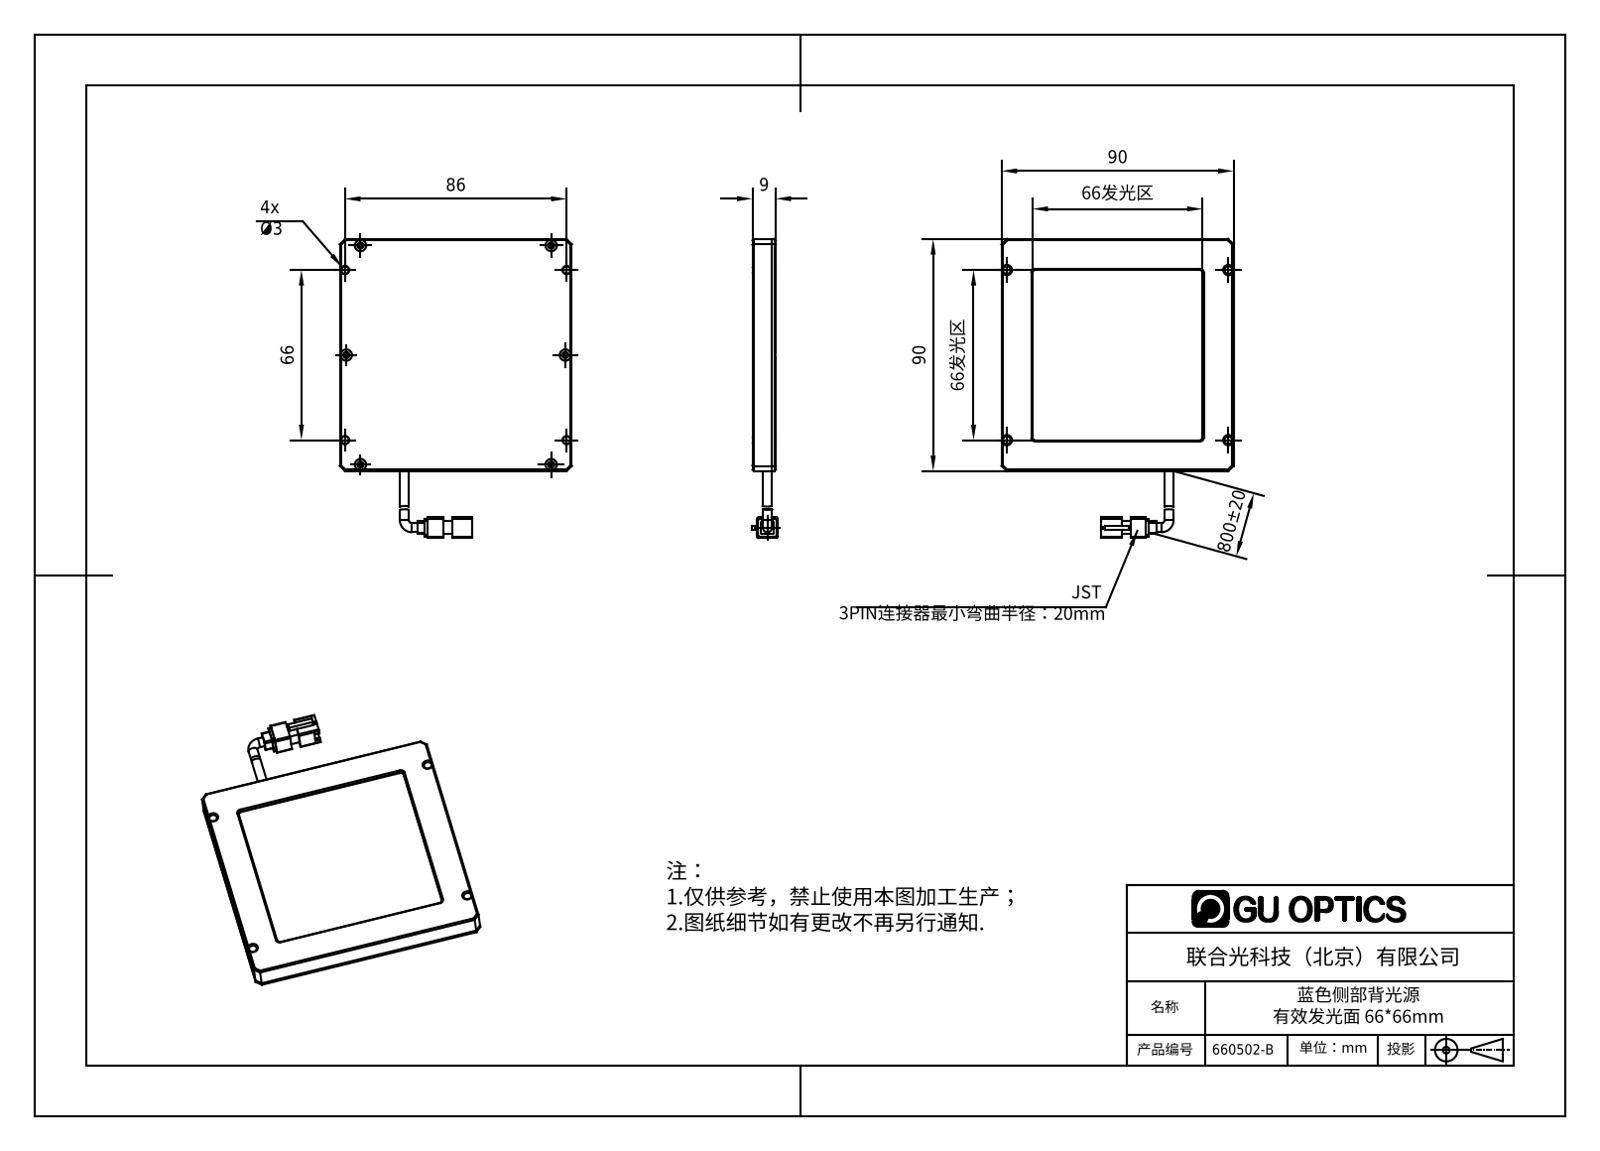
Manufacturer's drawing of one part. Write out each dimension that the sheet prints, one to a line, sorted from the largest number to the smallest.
800±20
90
90
86
66
66发光区
66发光区
9
